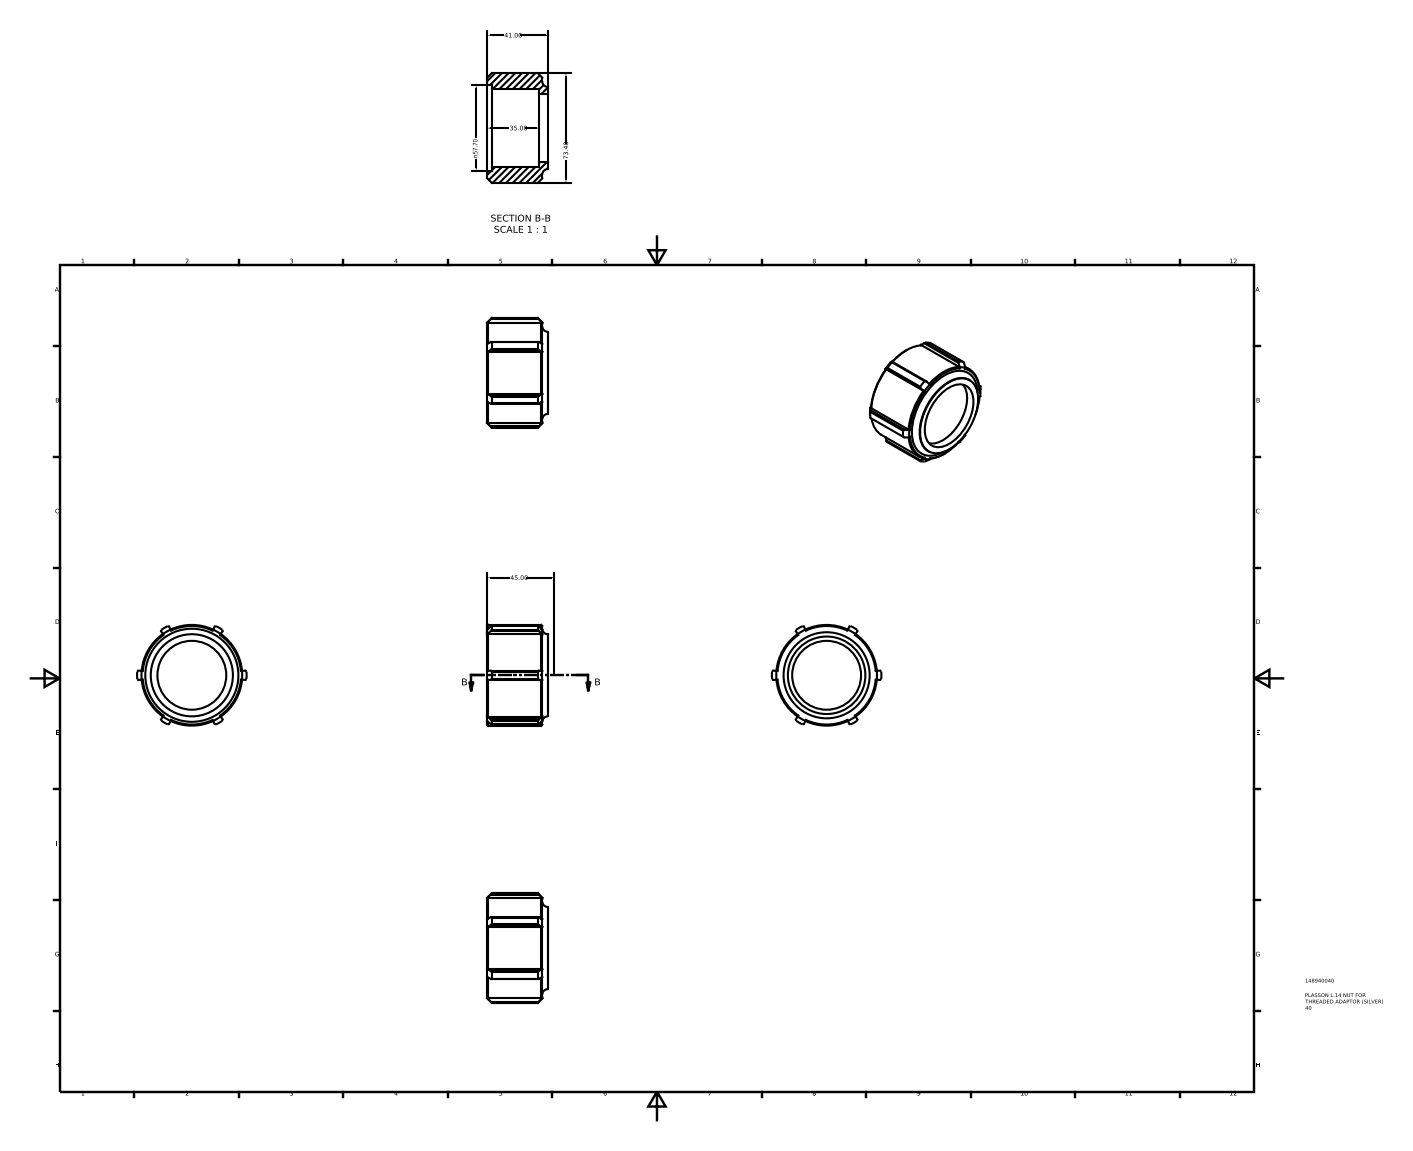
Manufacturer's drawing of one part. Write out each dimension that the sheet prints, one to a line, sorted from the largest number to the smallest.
73.40
n57.70
45.00
41.00
35.00
